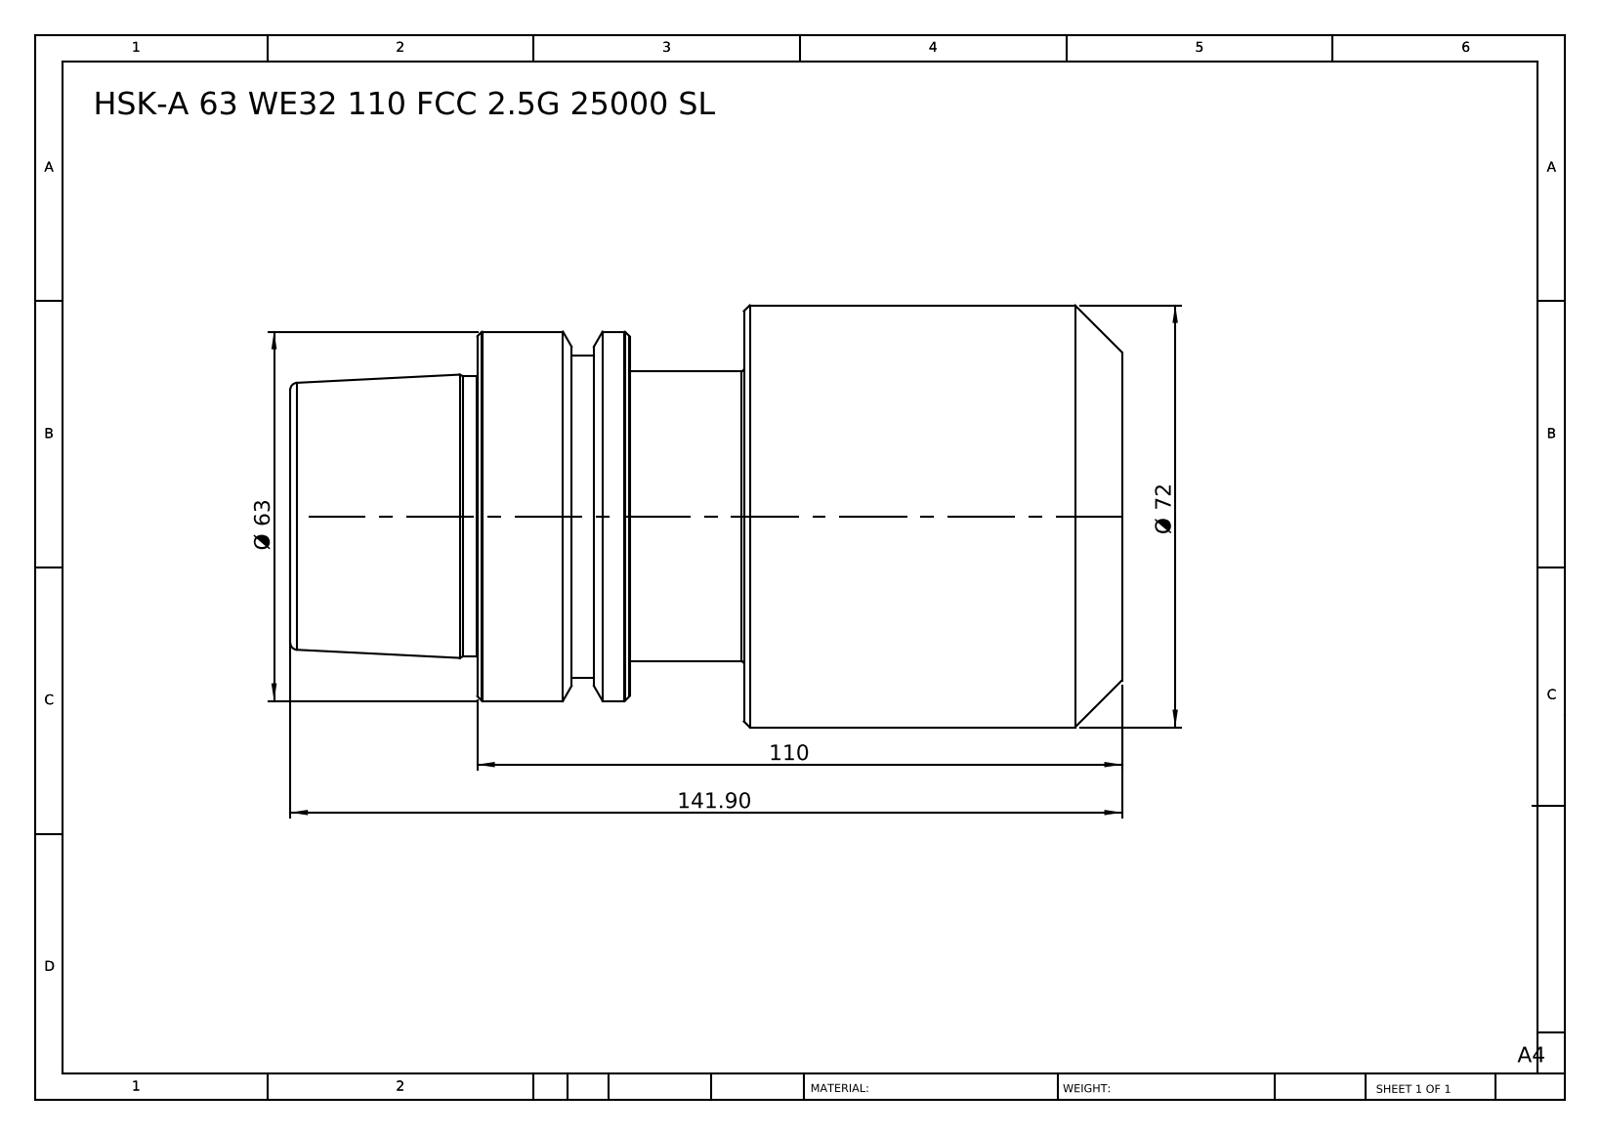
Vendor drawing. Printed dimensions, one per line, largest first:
141.90
110
Ø 72
Ø 63
